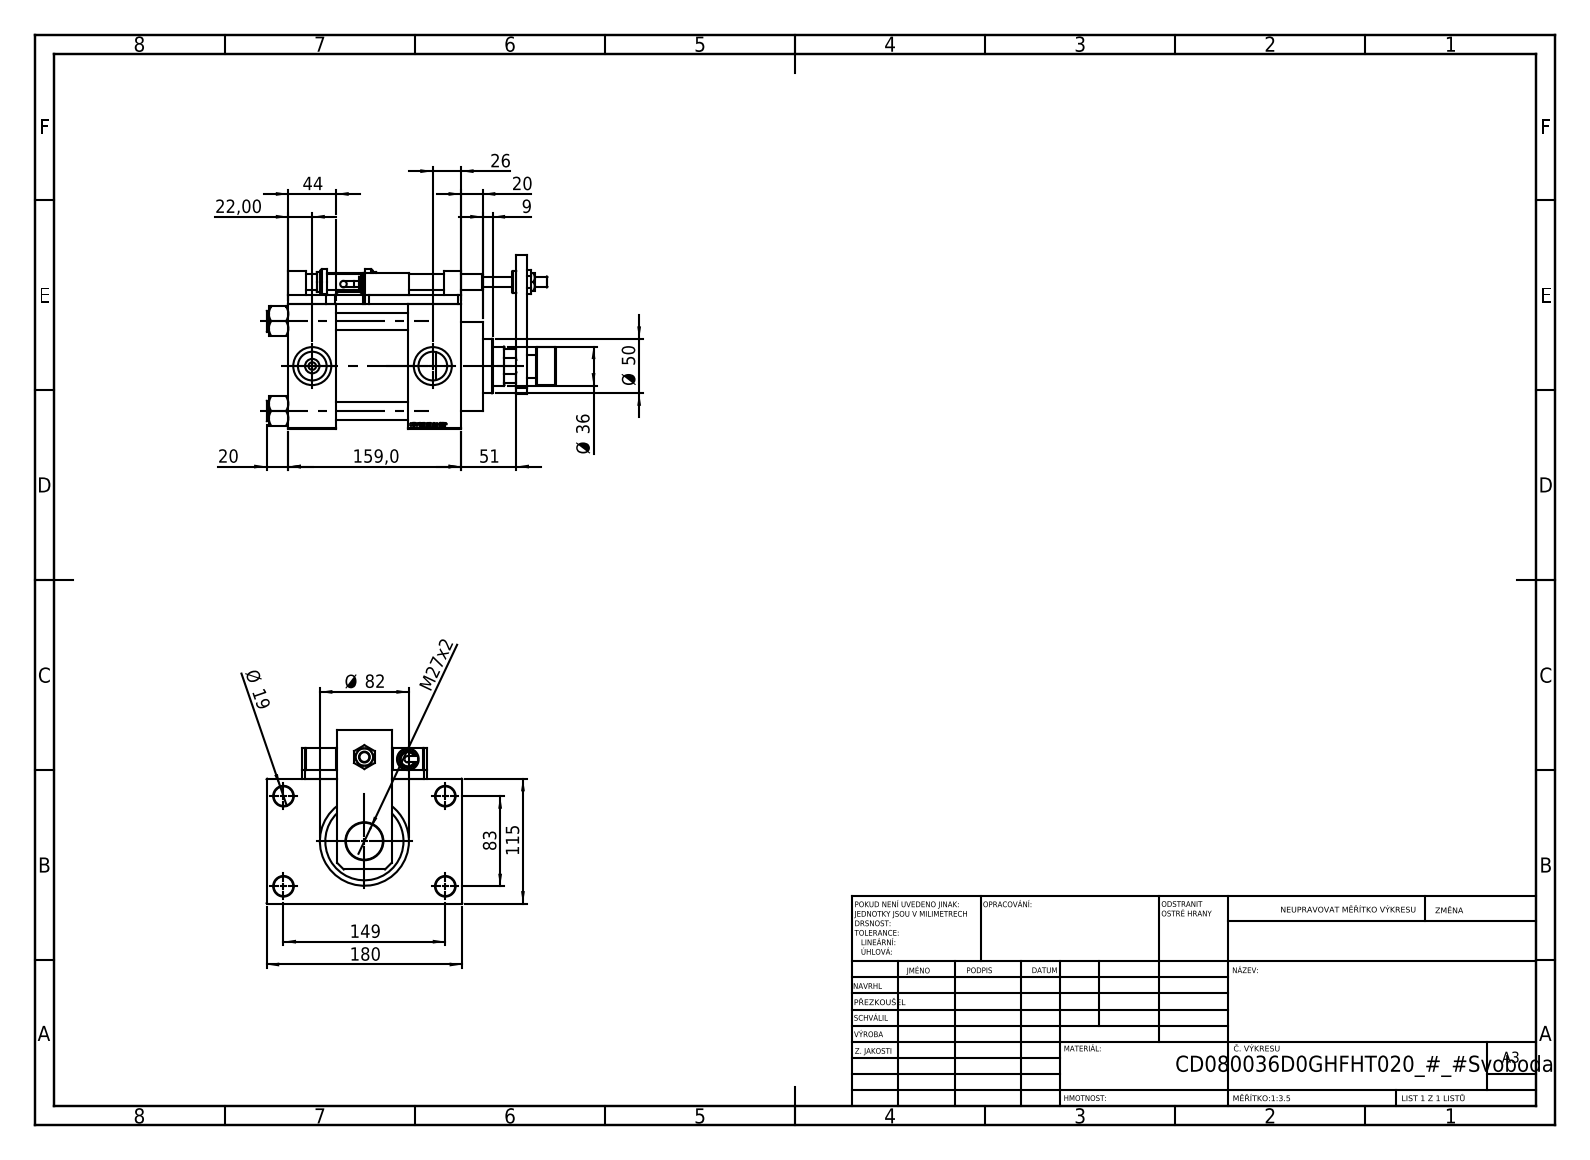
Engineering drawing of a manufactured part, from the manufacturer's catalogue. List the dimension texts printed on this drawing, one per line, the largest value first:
180
159,0
149
115
83
Ø 82
51
Ø 50
44
Ø 36
M27x2
26
22,00
20
20
Ø 19
9
